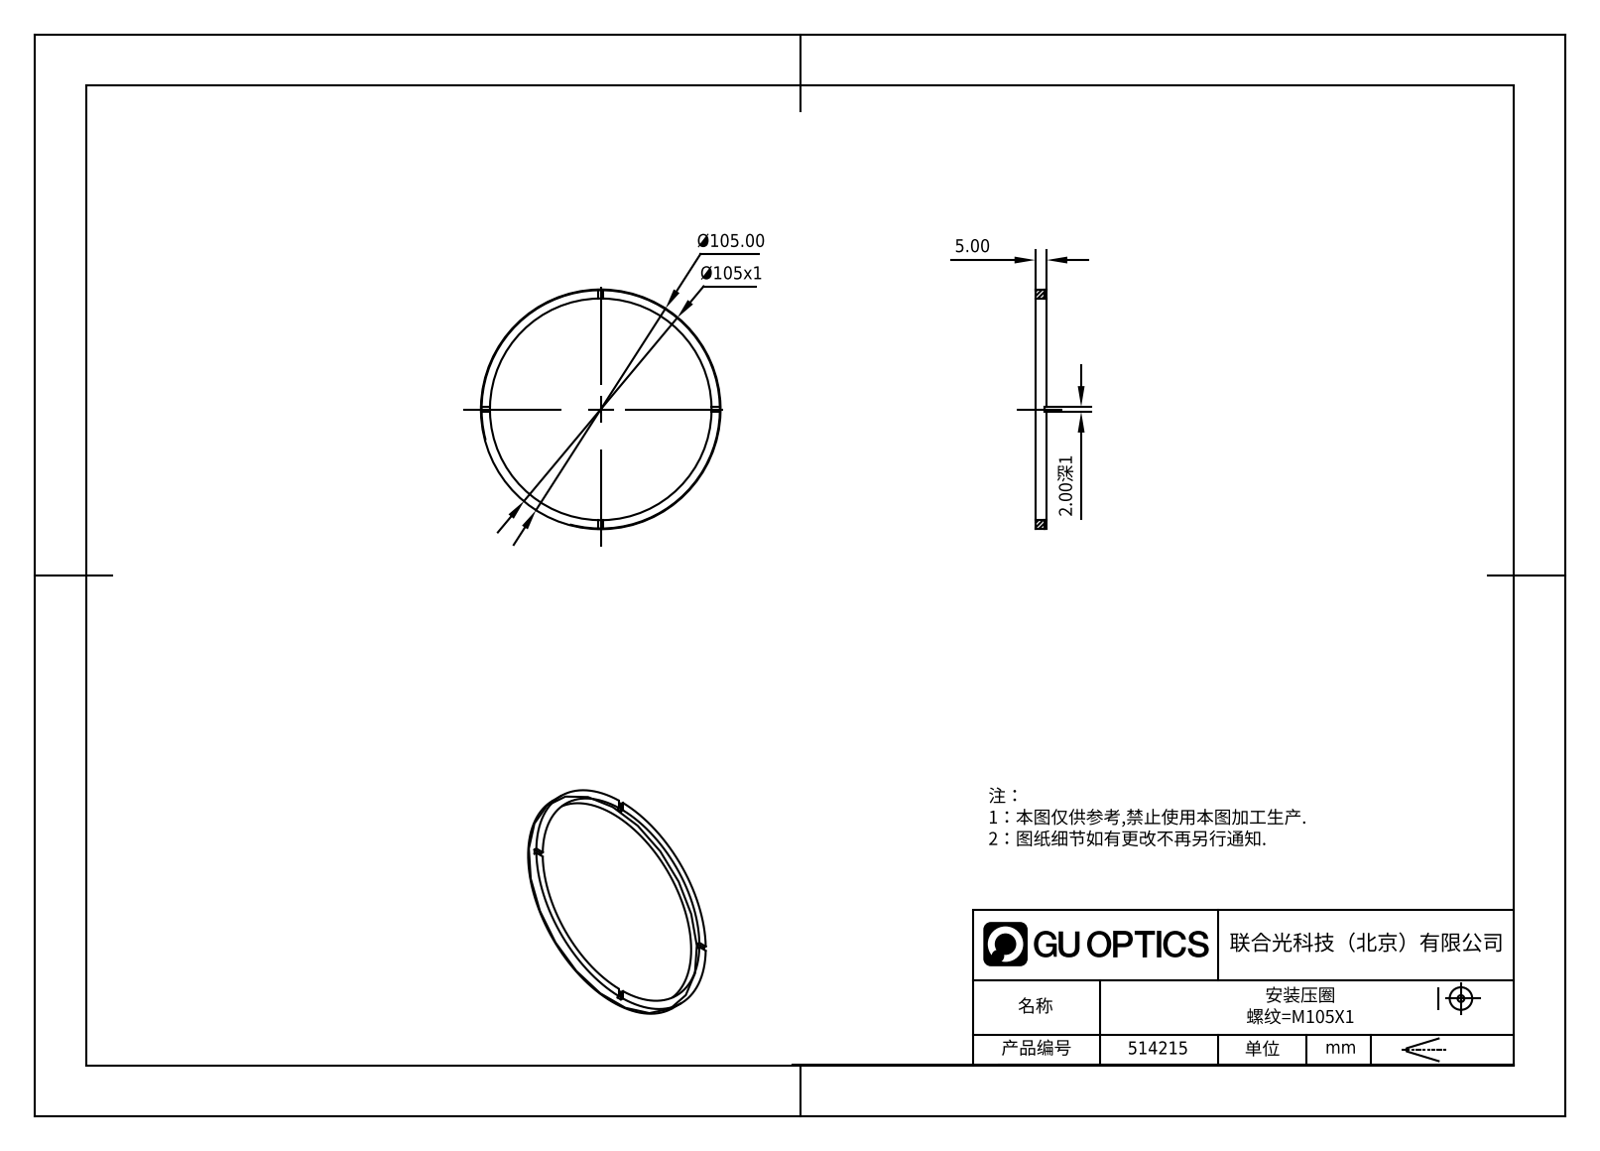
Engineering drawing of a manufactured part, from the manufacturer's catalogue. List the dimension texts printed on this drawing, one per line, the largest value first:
Ø105.00
Ø105x1
5.00
2.00深1
